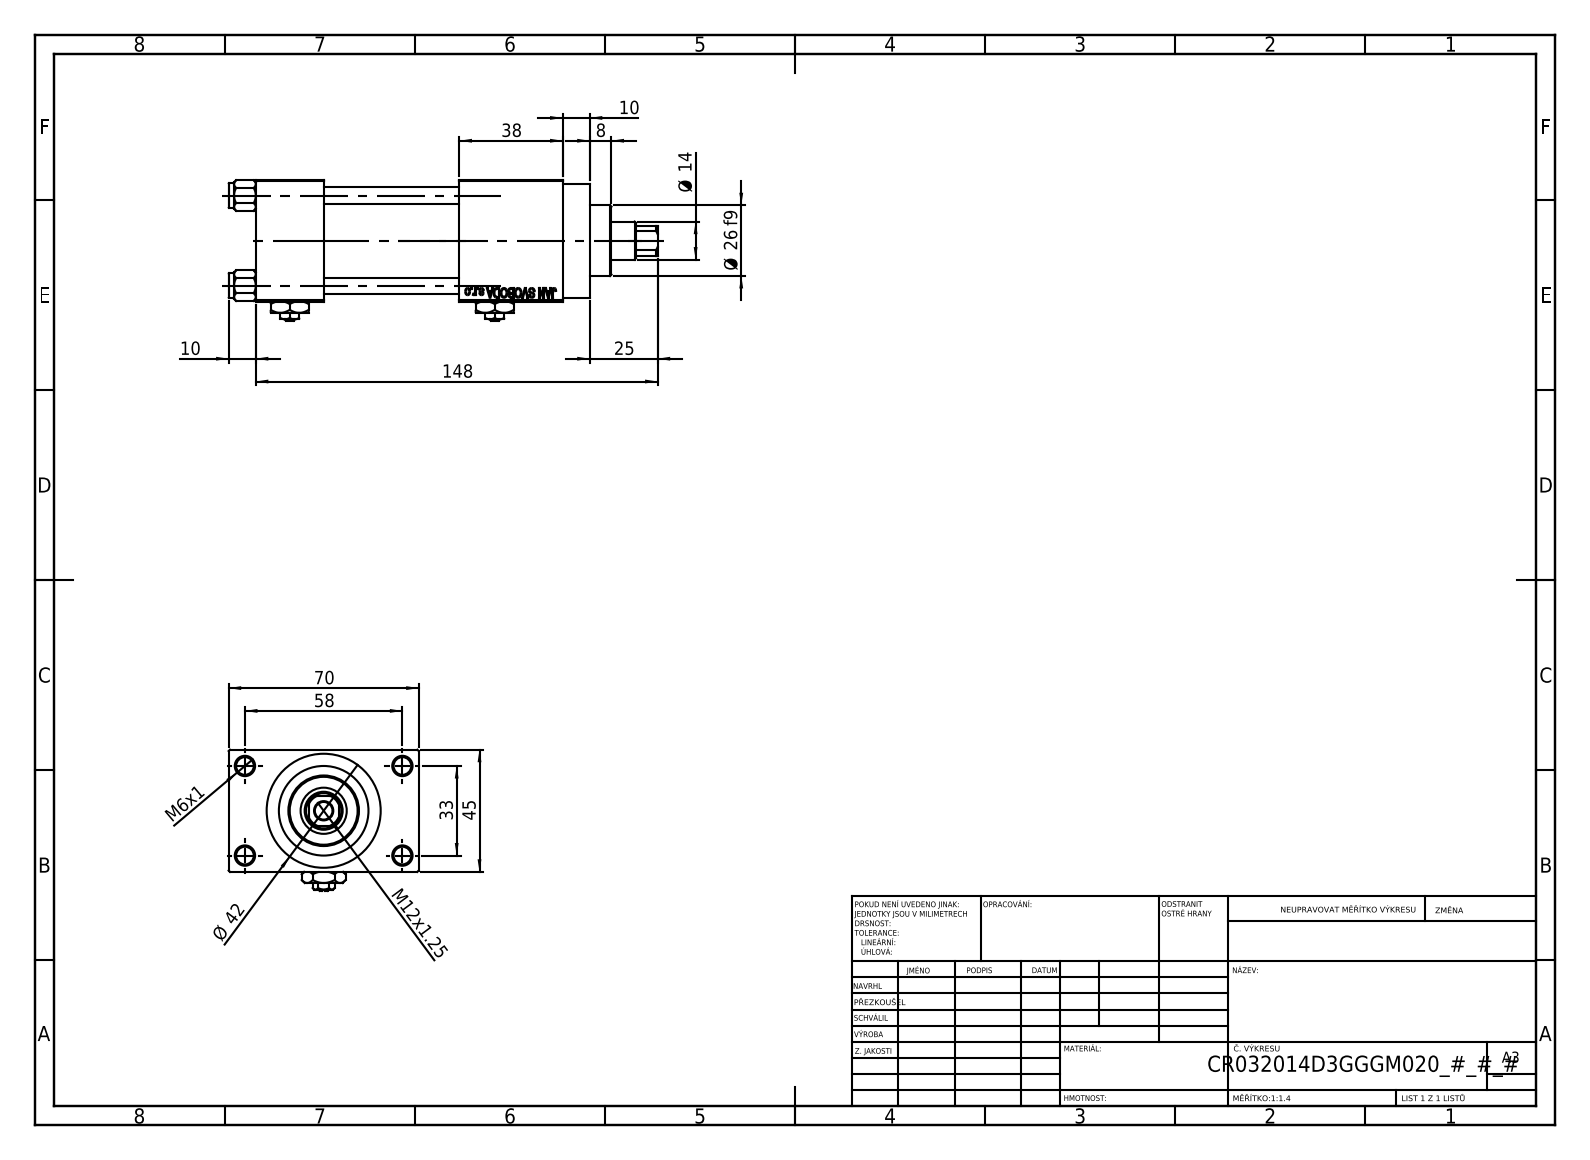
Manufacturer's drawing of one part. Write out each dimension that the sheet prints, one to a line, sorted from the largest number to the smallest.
148
70
58
45
Ø 42
38
33
Ø 26 f9
25
Ø 14
M12x1.25
10
10
8
M6x1
